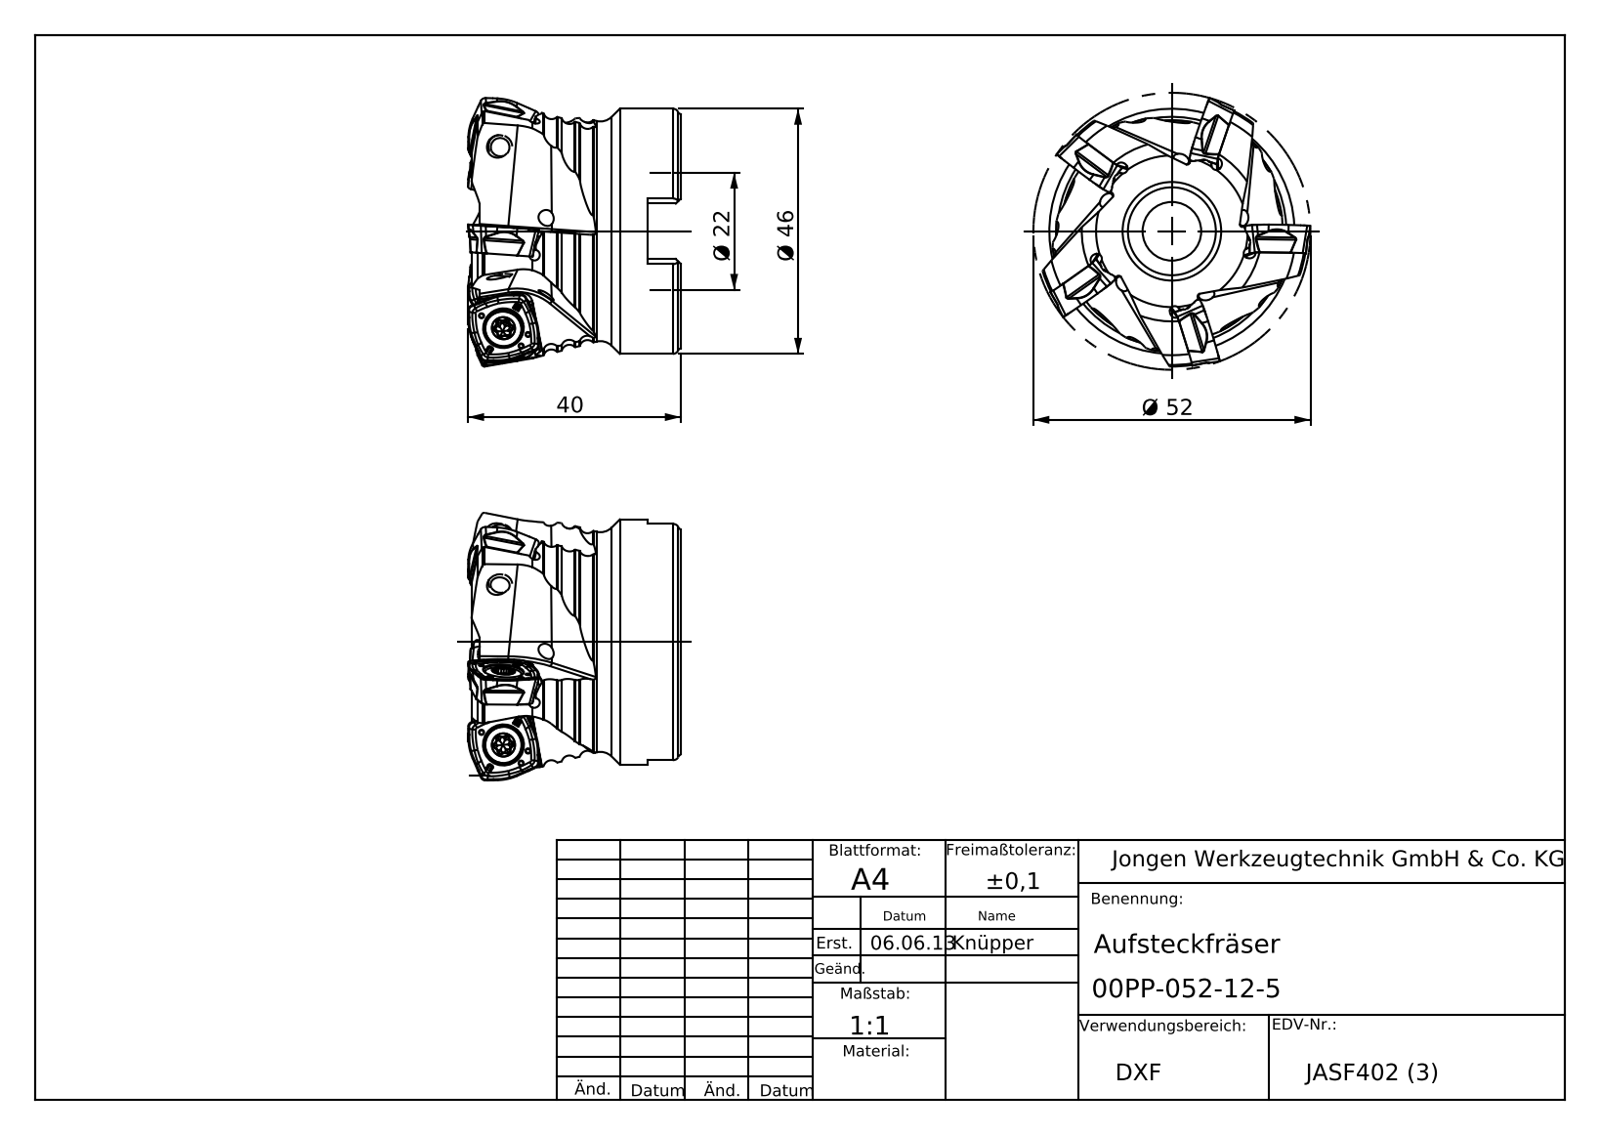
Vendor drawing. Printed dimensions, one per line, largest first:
Ø 52
Ø 46
40
Ø 22
